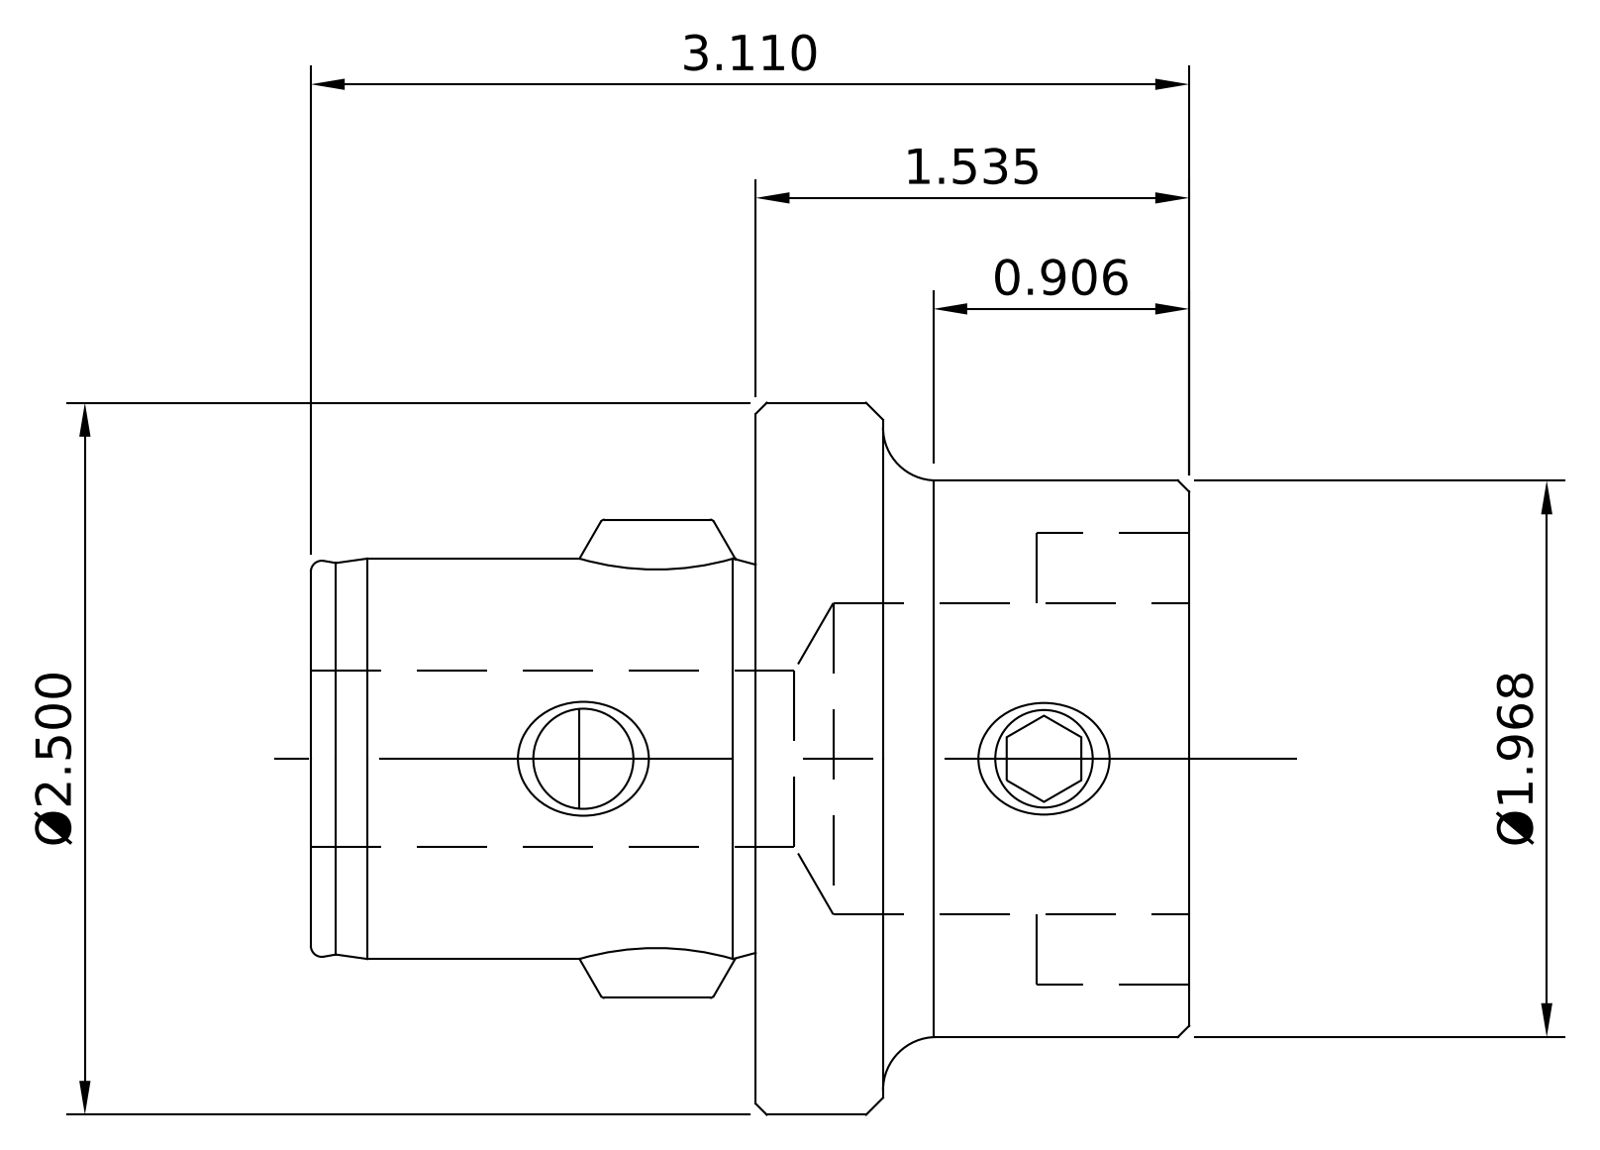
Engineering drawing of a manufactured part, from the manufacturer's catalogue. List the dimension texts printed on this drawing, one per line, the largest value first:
3.110
Ø2.500
Ø1.968
1.535
0.906
